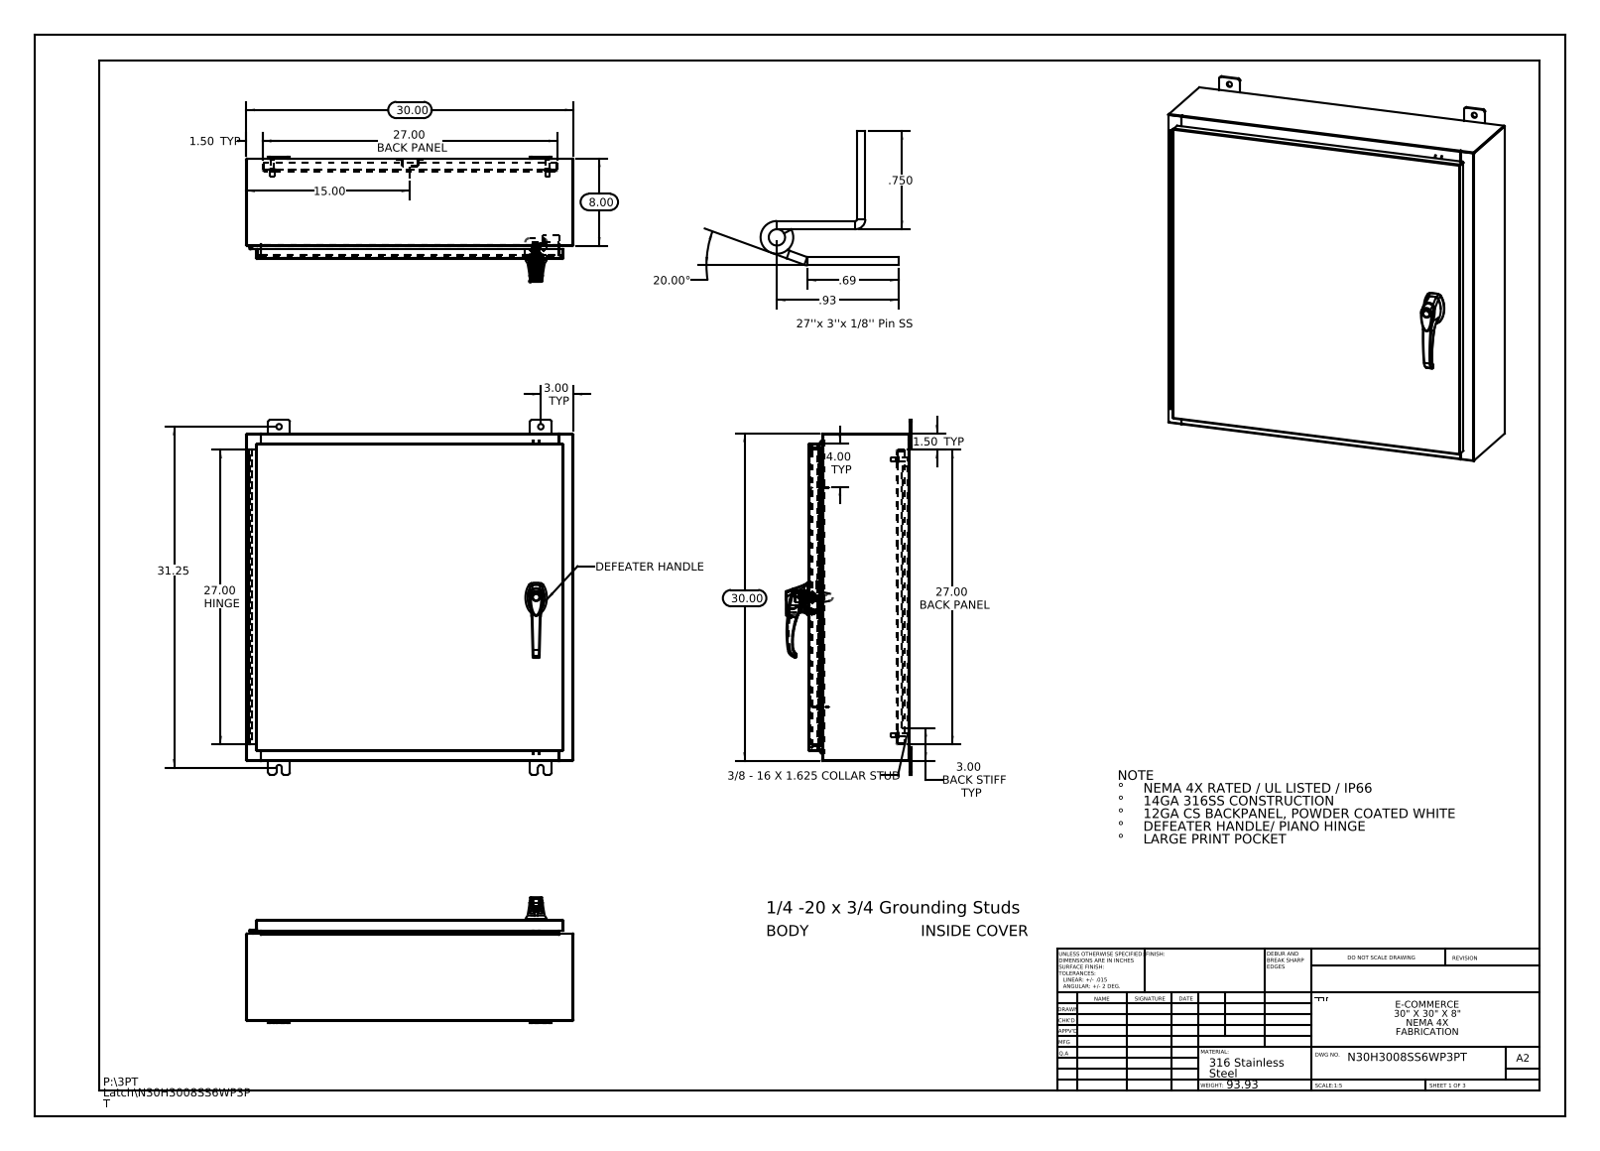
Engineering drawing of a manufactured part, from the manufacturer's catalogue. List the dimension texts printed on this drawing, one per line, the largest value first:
31.25
30.00
30.00
27.00 HINGE
27.00 BACK PANEL
27.00 BACK PANEL
20.00°
15.00
8.00
4.00 TYP
3.00 TYP
3.00 BACK STIFF TYP
1.50 TYP
1.50 TYP
.93
.750
.69
